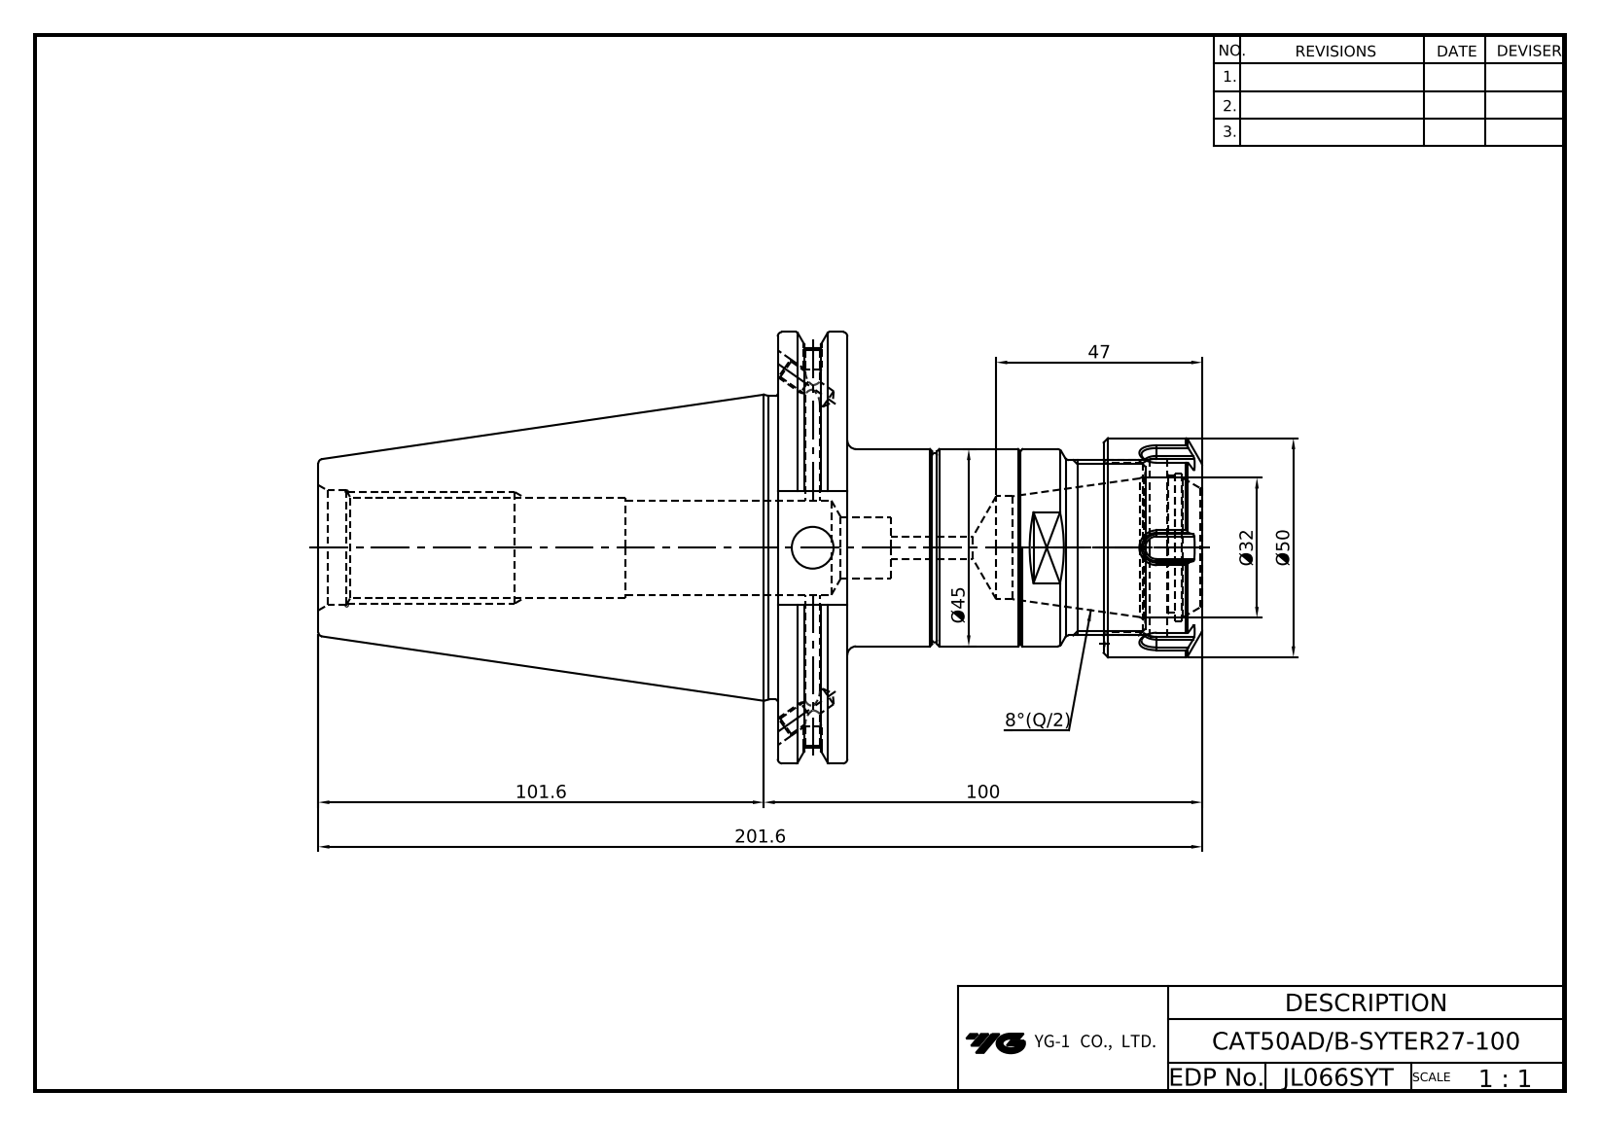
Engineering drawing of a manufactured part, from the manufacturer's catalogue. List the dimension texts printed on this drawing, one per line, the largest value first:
201.6
101.6
100
Ø50
47
Ø45
Ø32
